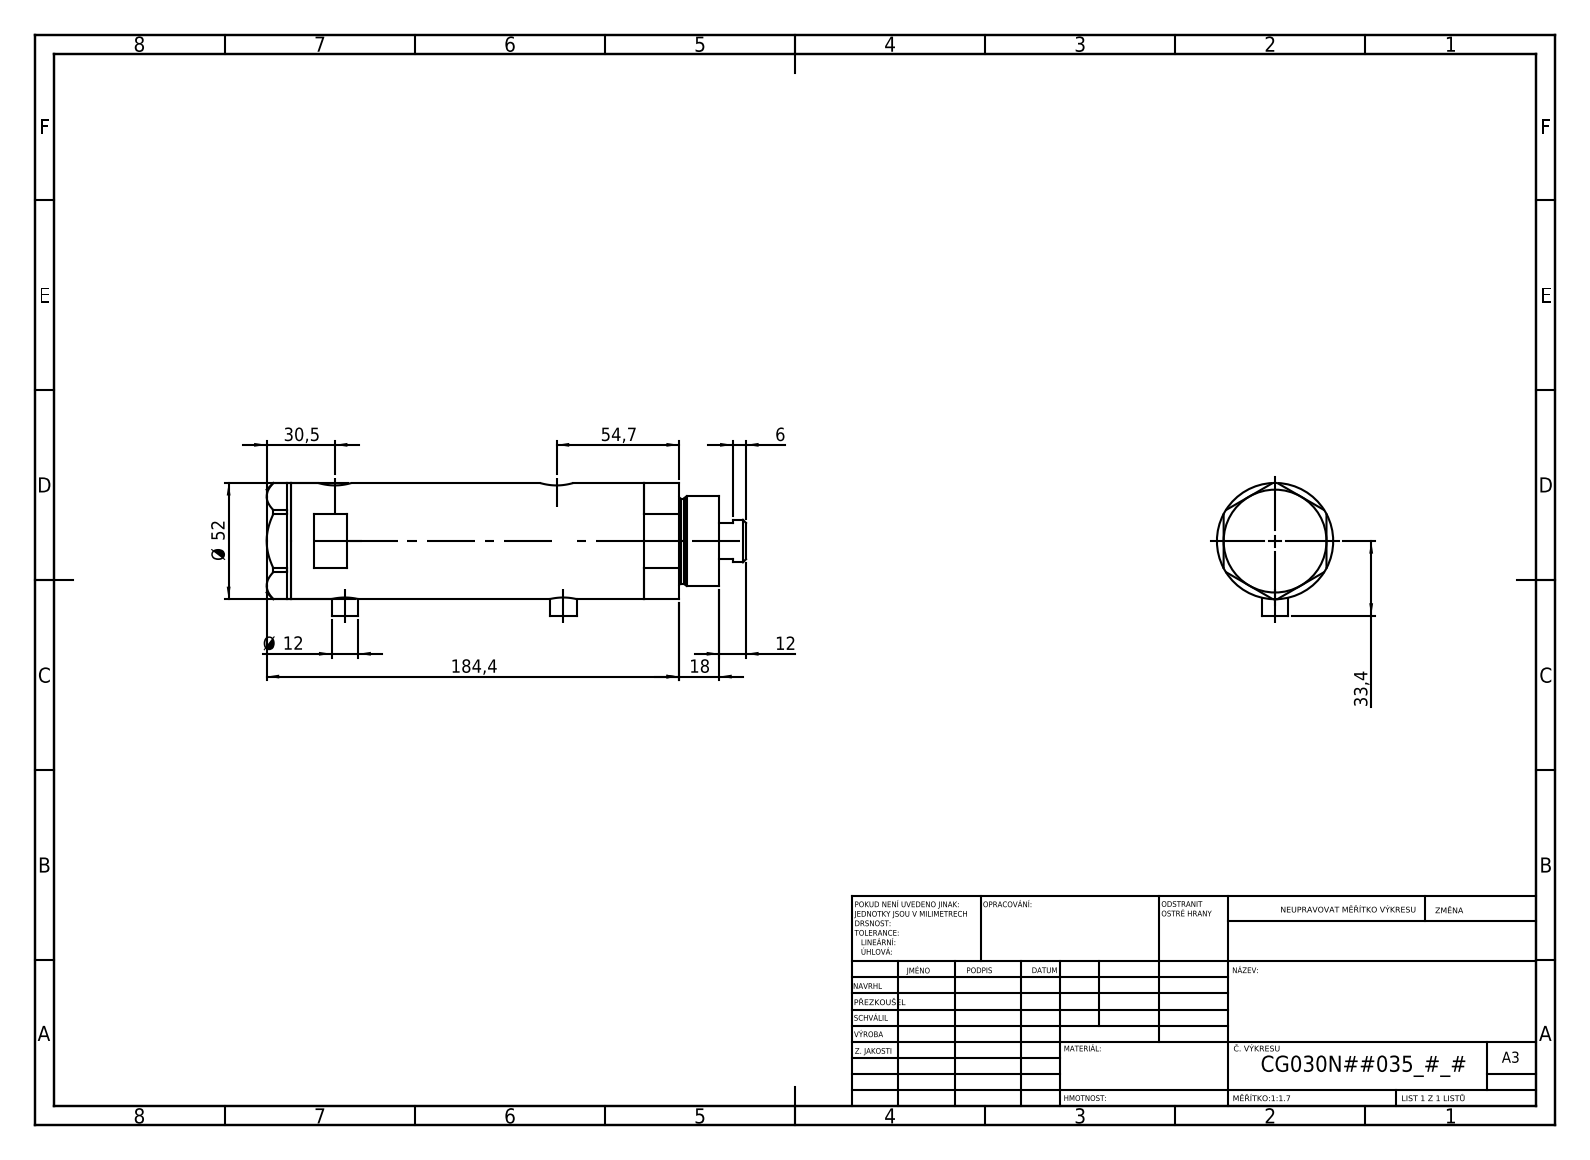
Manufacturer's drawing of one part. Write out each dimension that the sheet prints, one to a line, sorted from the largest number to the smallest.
184,4
54,7
Ø 52
33,4
30,5
18
12
Ø 12
6
